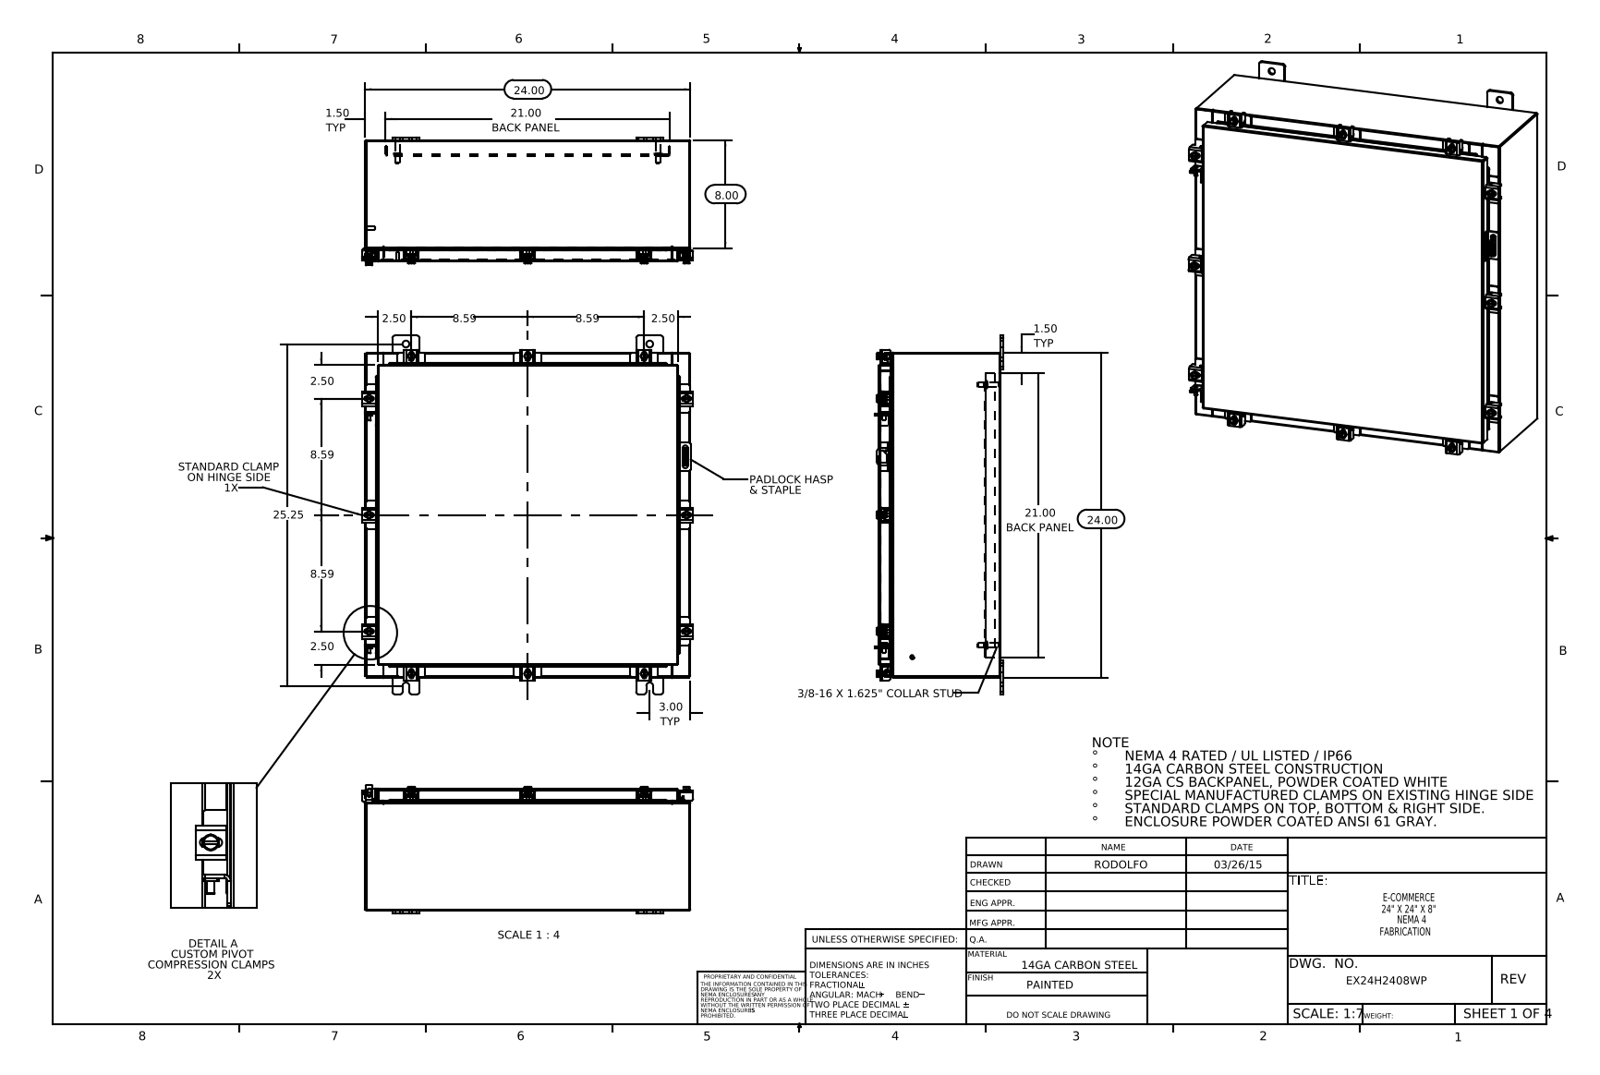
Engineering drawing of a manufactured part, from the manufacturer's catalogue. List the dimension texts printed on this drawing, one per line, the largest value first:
25.25
24.00
24.00
21.00 BACK PANEL
21.00 BACK PANEL
8.59
8.59
8.59
8.59
8.00
3.00 TYP
2.50
2.50
2.50
2.50
1.50 TYP
1.50 TYP
